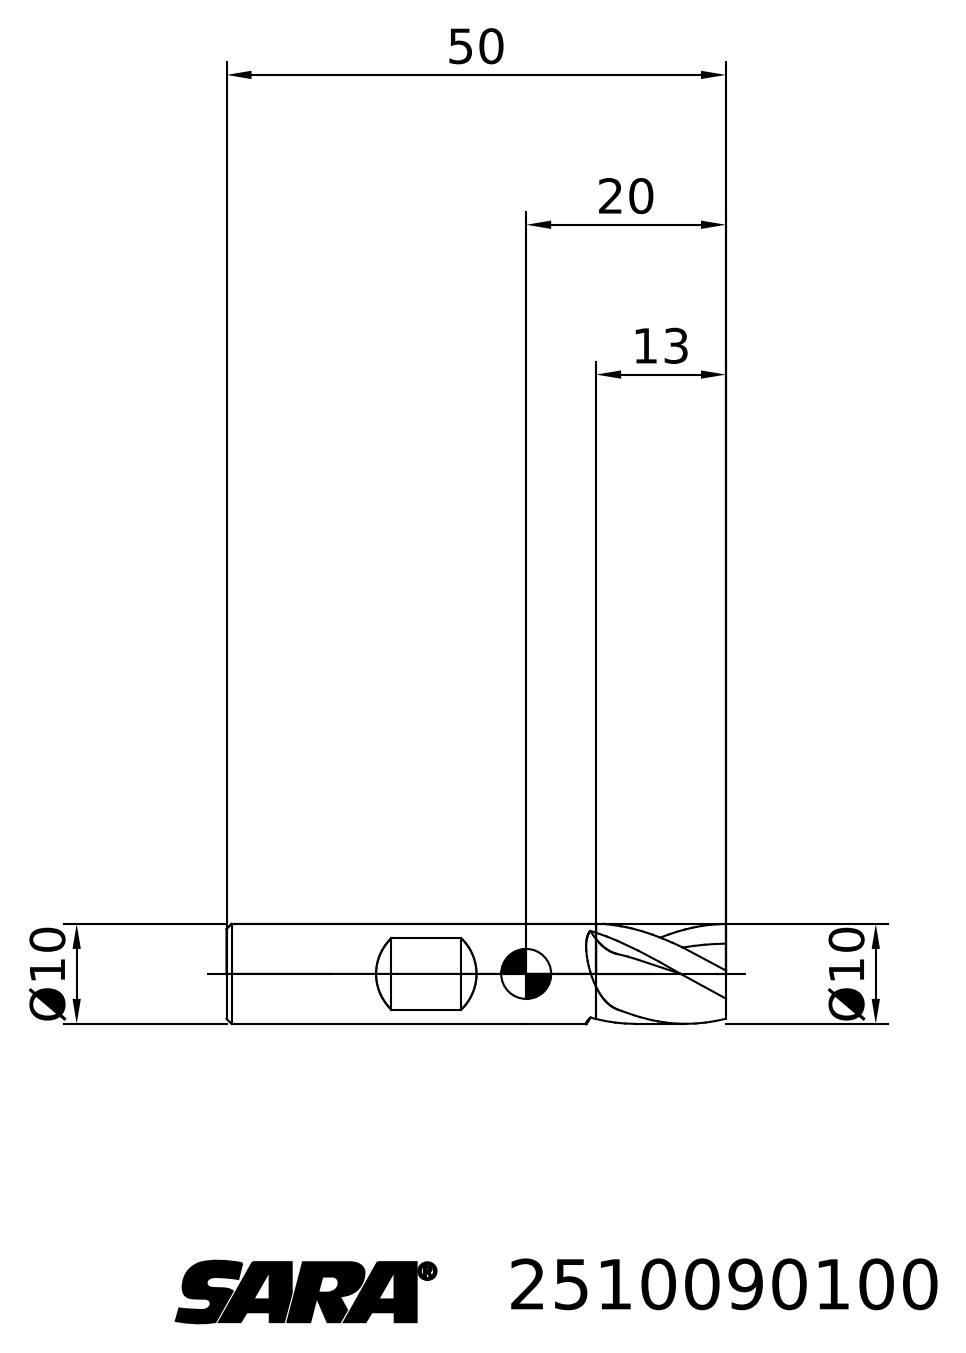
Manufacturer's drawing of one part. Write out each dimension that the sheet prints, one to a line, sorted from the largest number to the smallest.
50
20
13
Ø10
Ø10
